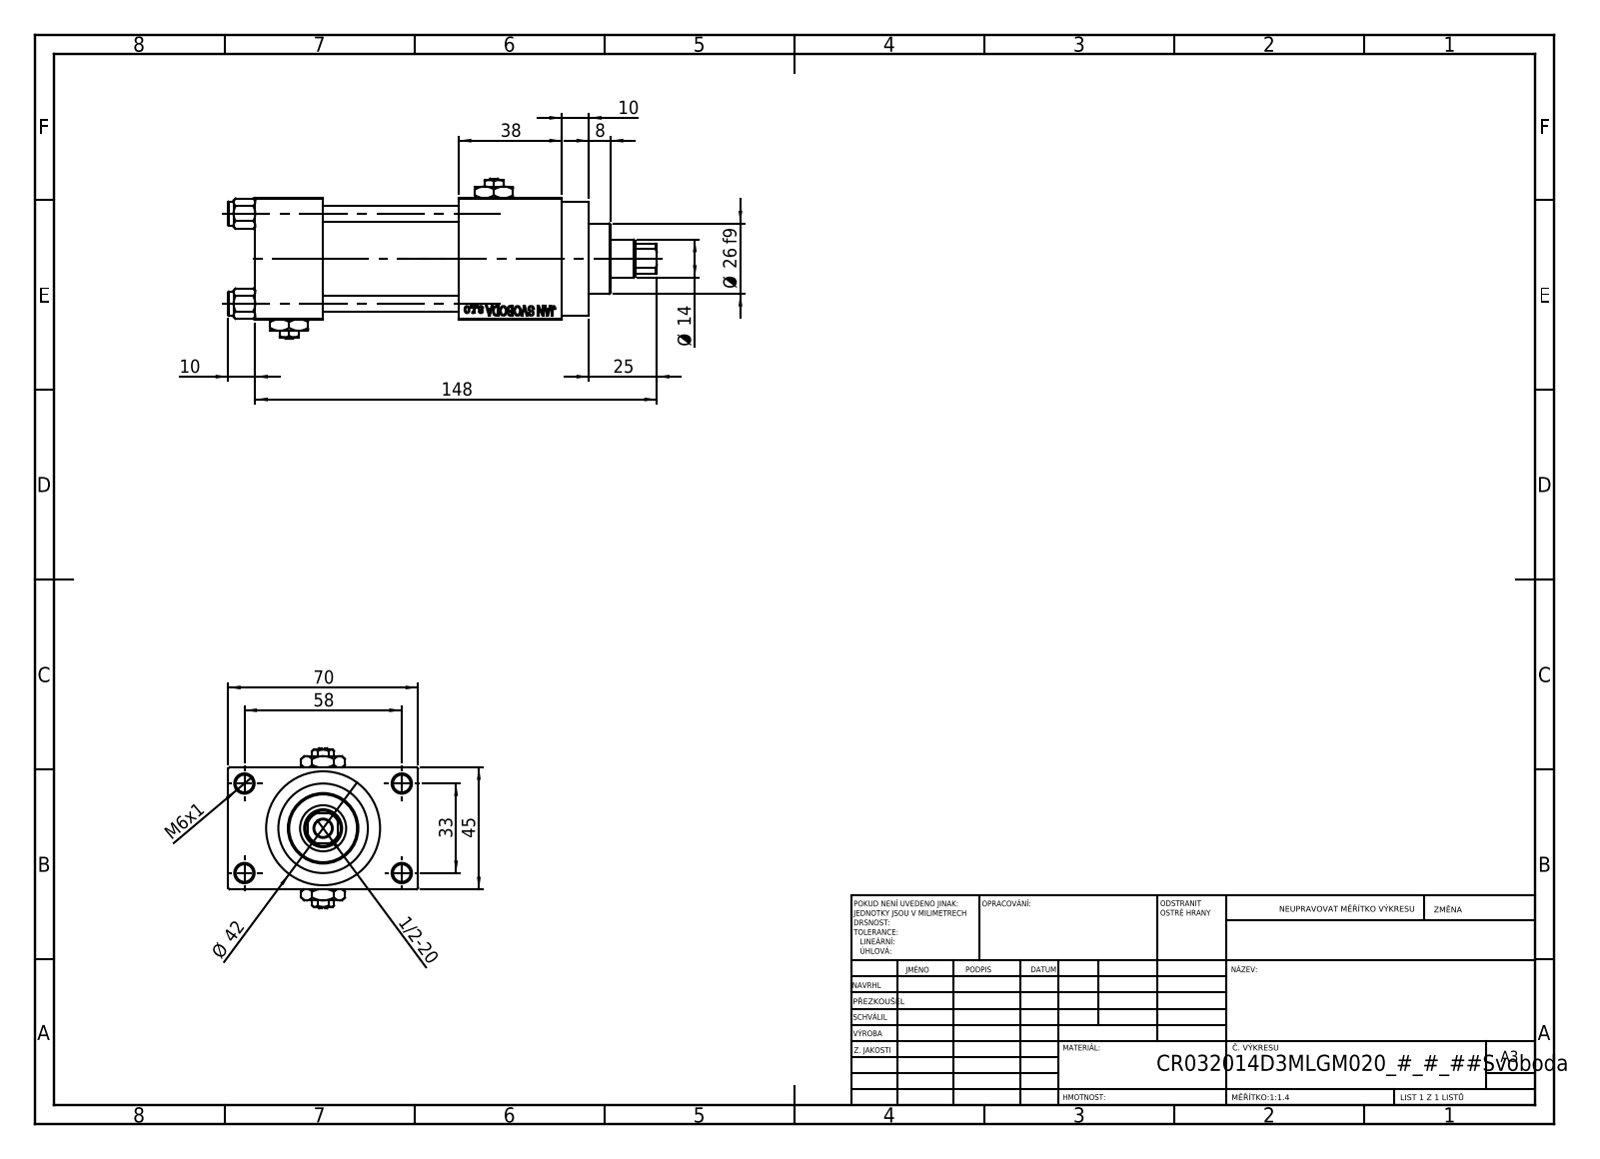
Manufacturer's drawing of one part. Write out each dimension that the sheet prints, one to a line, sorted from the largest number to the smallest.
148
70
58
45
Ø 42
38
33
Ø 26 f9
25
Ø 14
10
10
8
M6x1
1/2-20
